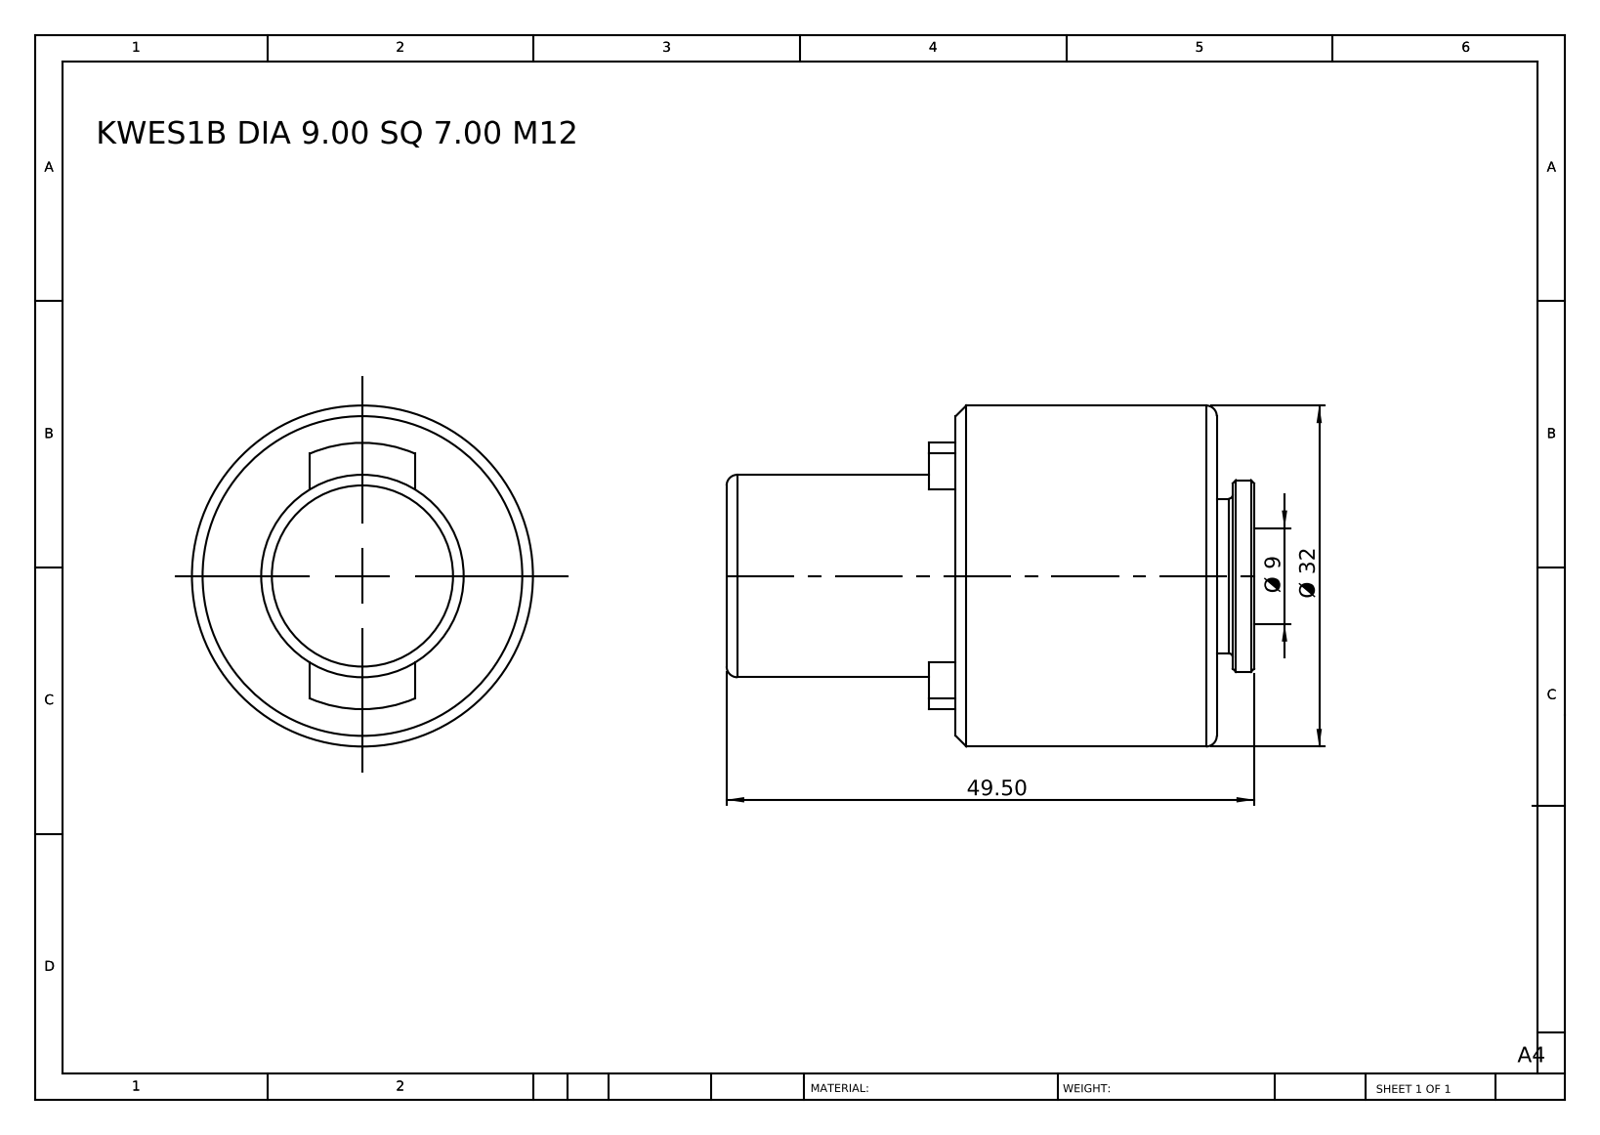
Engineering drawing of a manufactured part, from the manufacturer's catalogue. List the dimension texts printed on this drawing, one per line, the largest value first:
49.50
Ø 32
Ø 9
